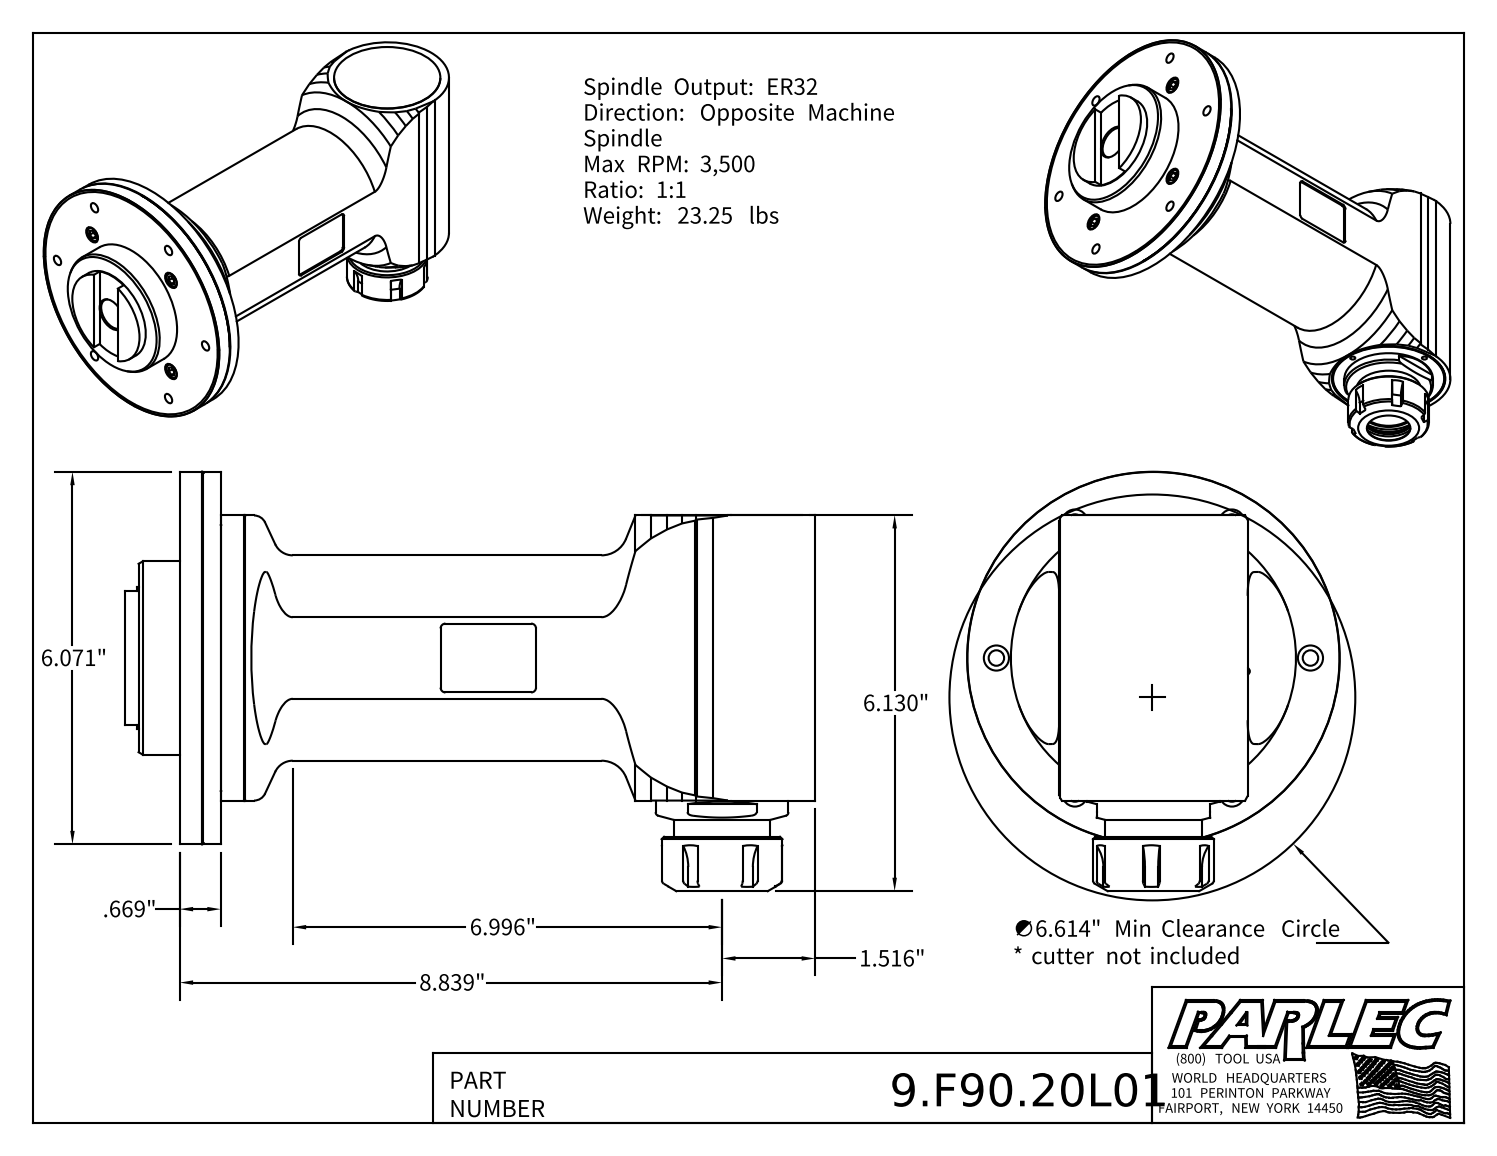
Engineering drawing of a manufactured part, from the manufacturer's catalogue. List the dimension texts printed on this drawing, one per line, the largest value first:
8.839"
6.996"
∅6.614" Min Clearance Circle * cutter not included
6.130"
6.071"
1.516"
.669"
